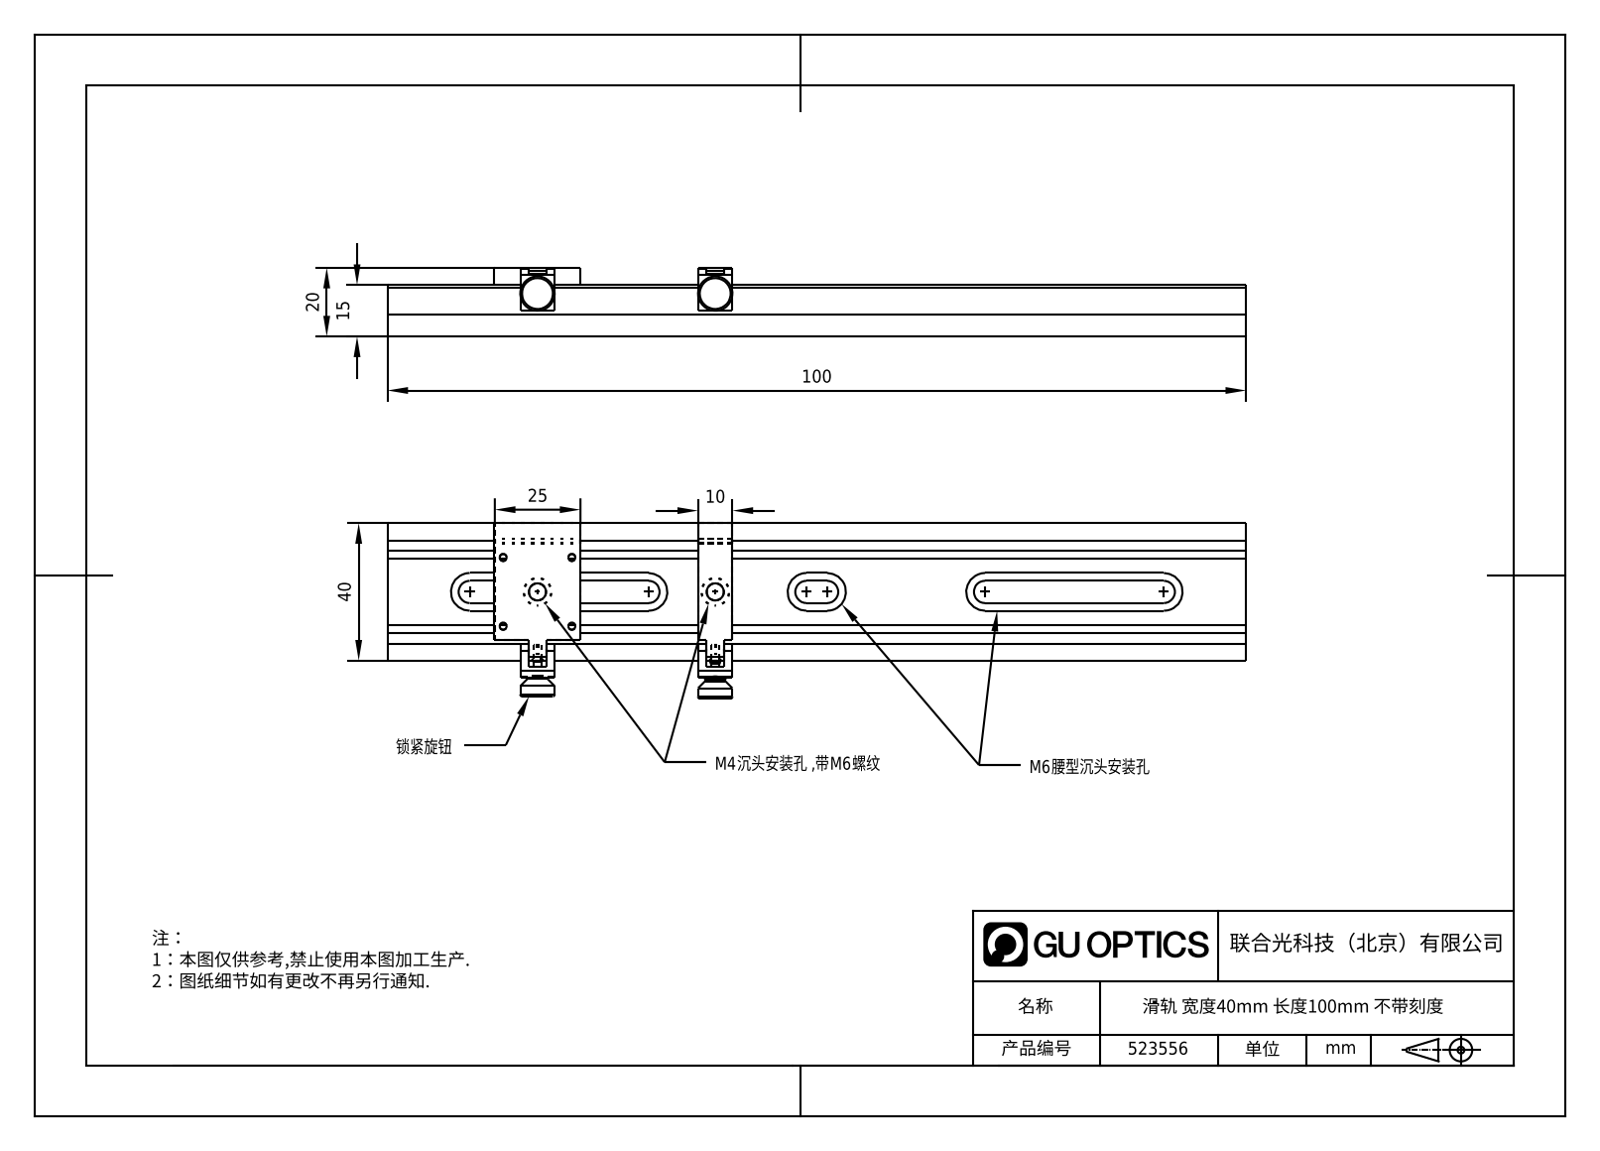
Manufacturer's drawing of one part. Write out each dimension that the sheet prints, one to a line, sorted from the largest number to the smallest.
100
40
25
20
15
10
